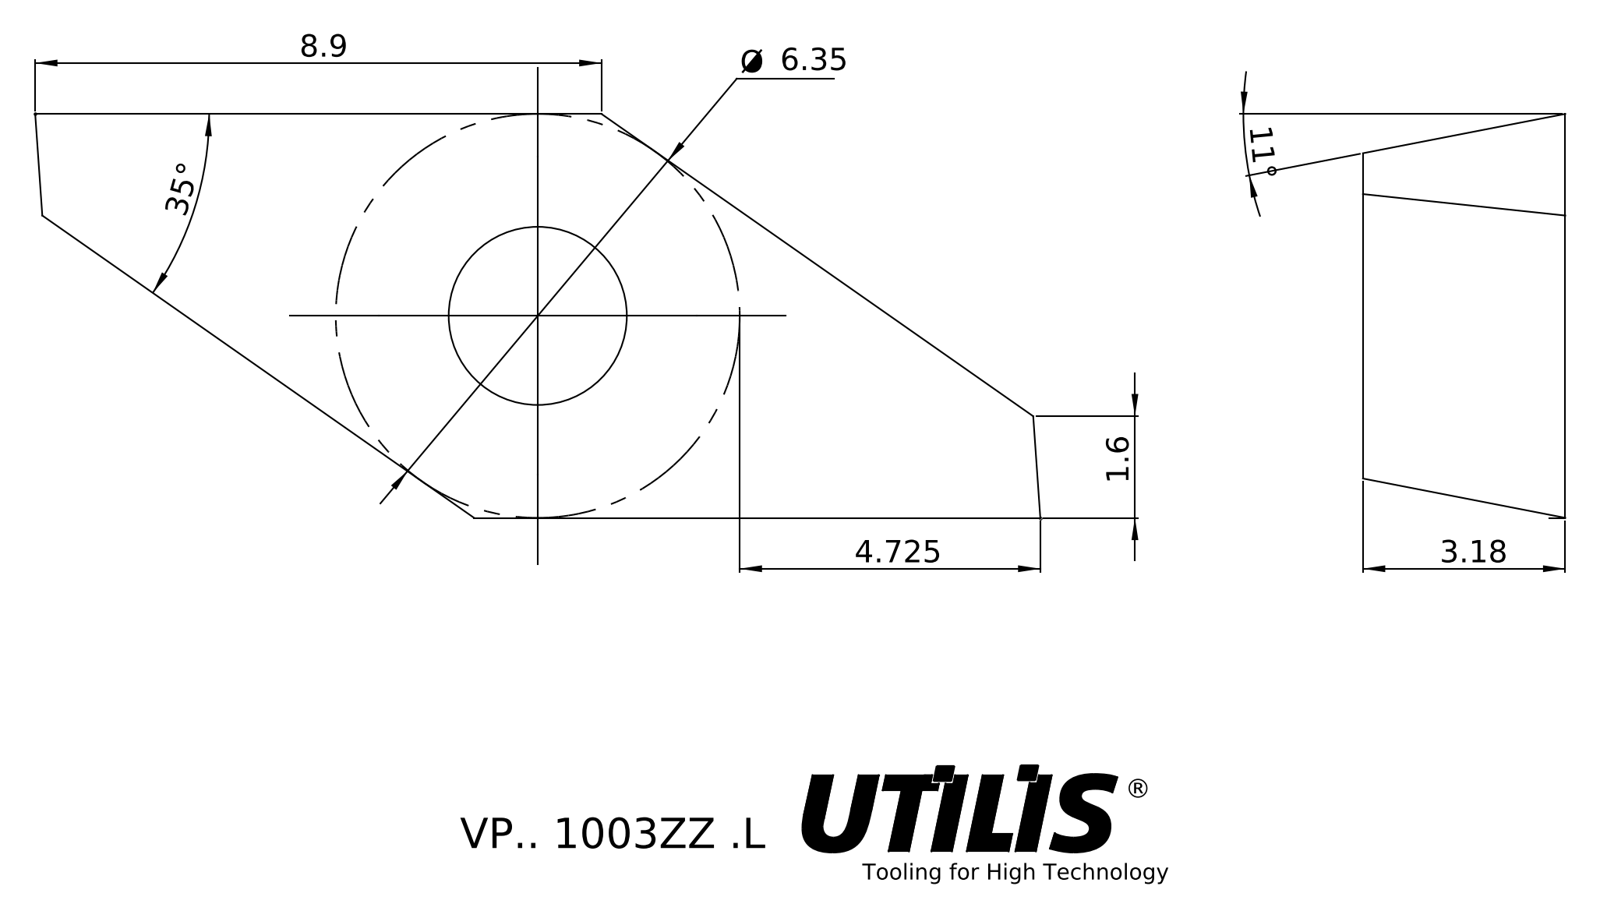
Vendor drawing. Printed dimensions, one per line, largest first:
35°
8.9
Ø 6.35
4.725
3.18
1.6
